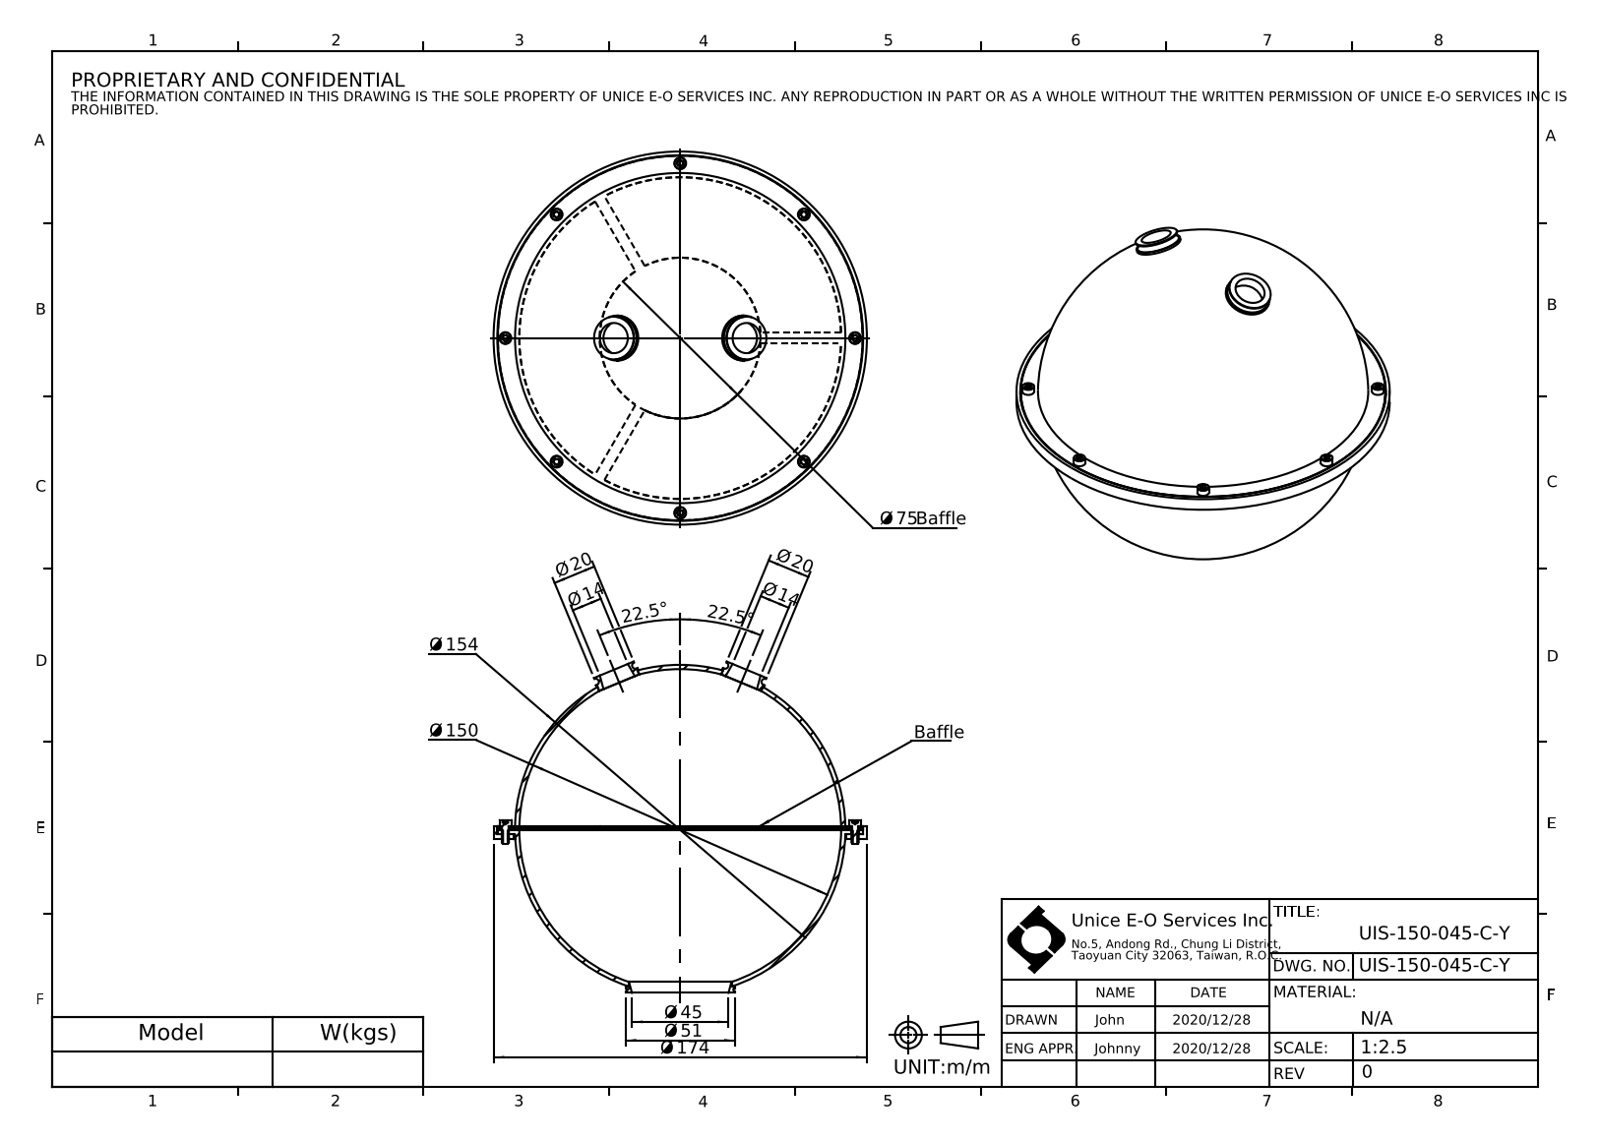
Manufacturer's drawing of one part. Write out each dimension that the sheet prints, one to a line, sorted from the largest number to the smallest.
Ø 174
Ø 154
Ø 150
Ø 75 Baffle
Ø 51
Ø 45
22.5°
22.5°
Ø 20
Ø 20
Ø 14
Ø 14
